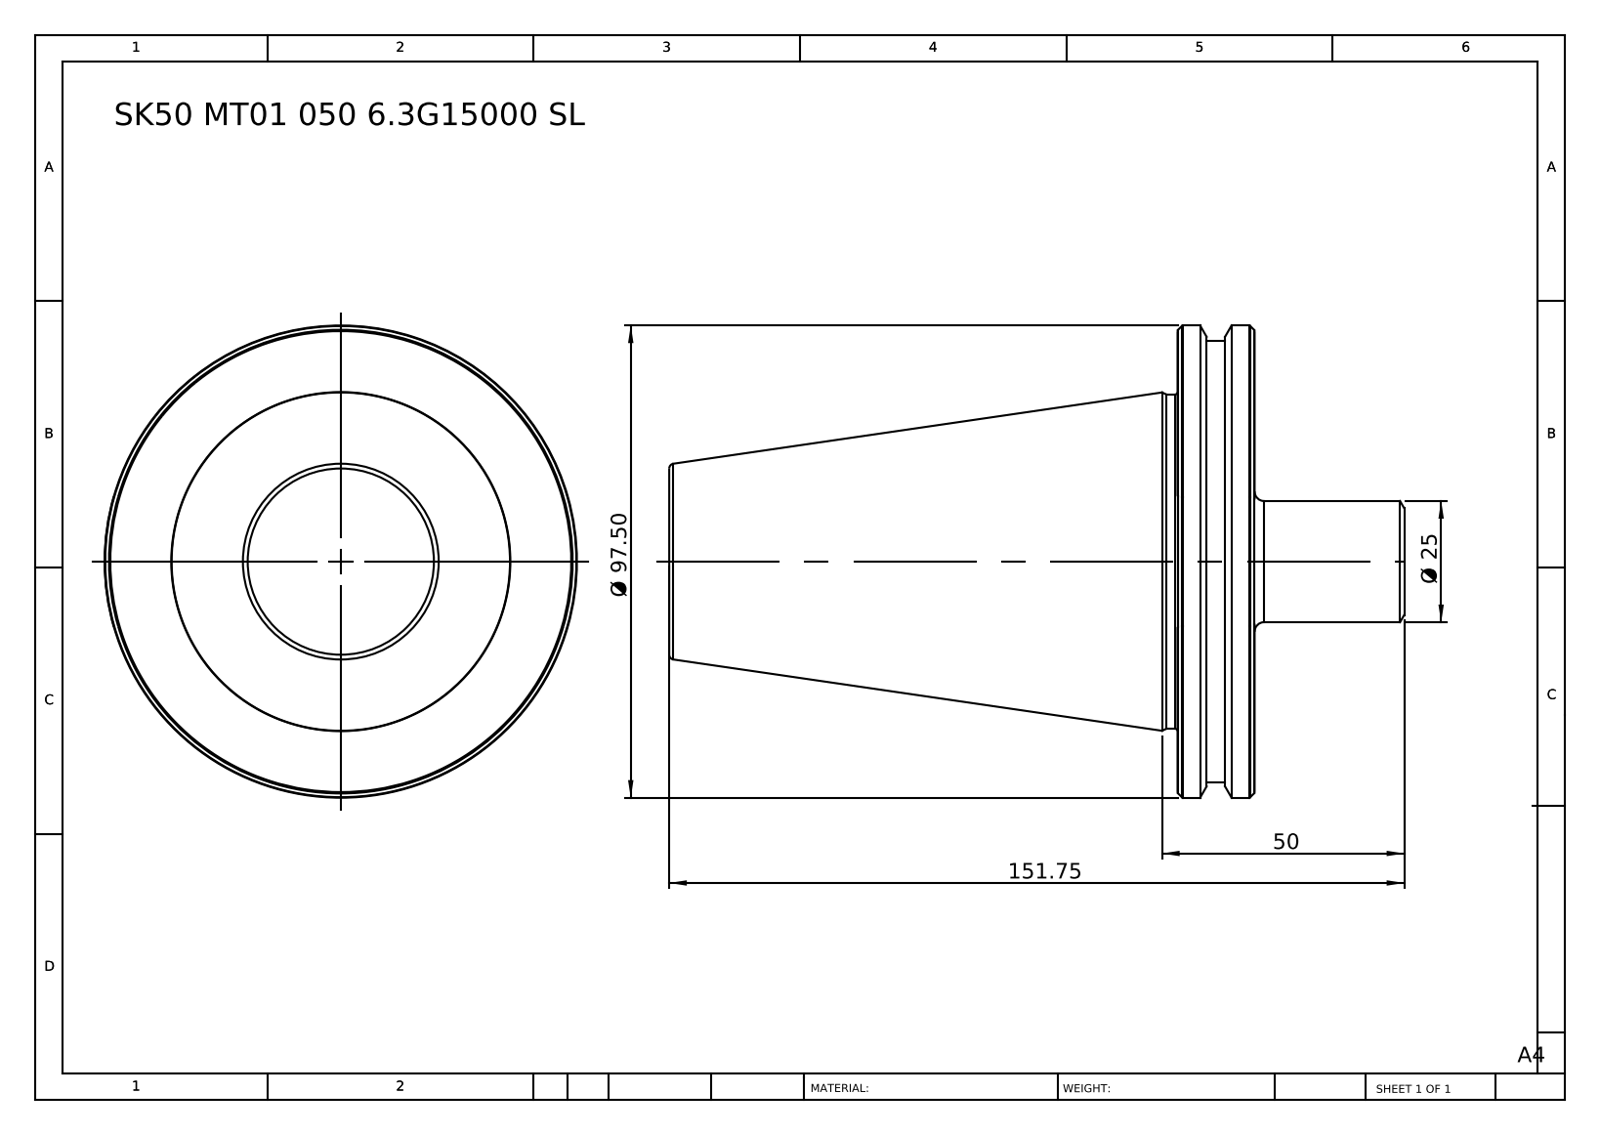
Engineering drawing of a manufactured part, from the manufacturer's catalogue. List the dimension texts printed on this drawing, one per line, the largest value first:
151.75
Ø 97.50
50
Ø 25
